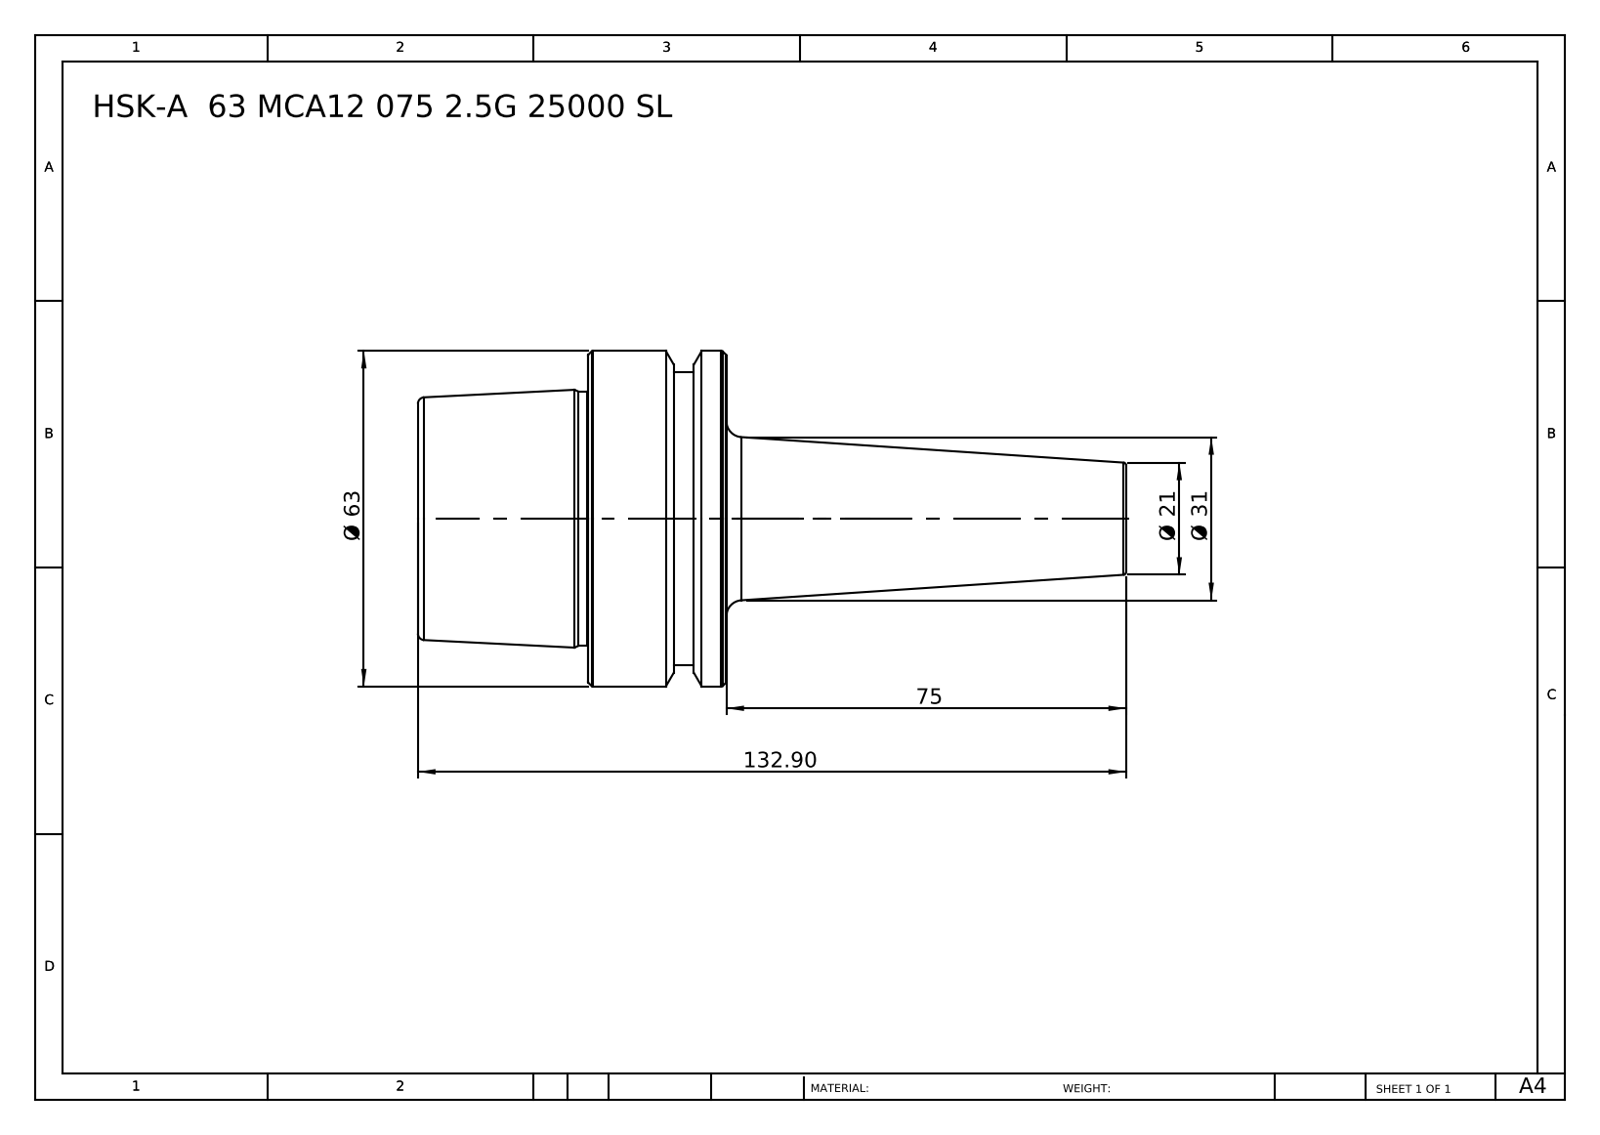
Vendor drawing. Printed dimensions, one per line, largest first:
132.90
75
Ø 63
Ø 31
Ø 21
